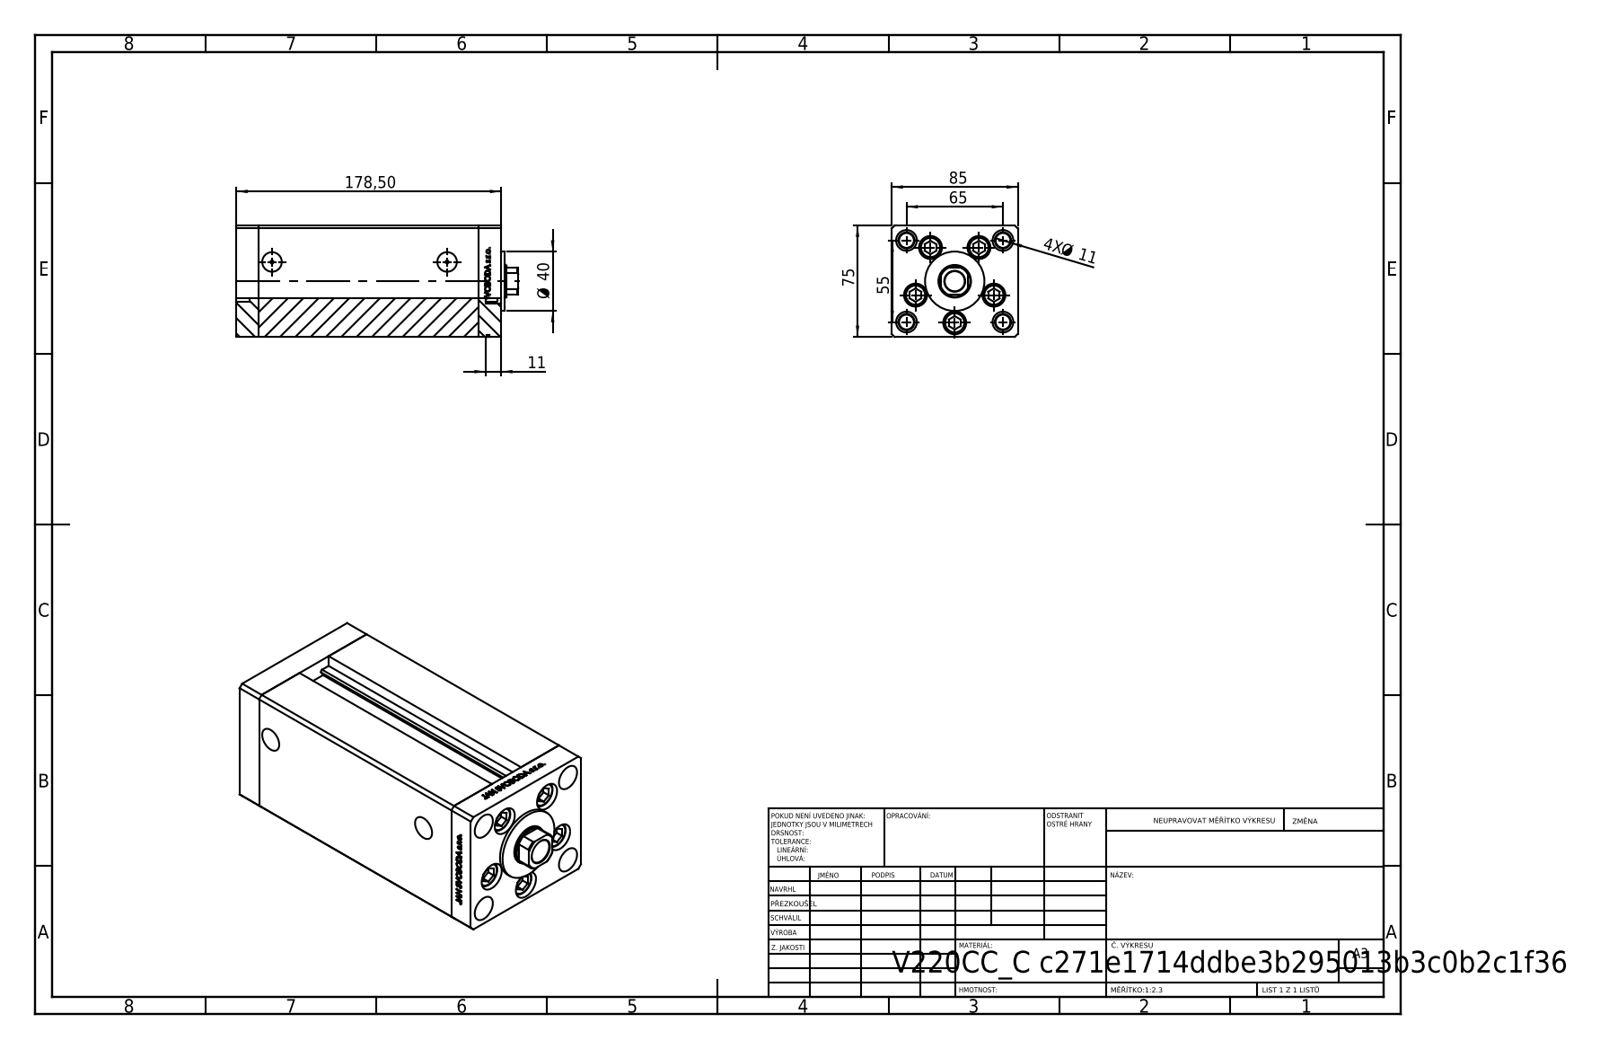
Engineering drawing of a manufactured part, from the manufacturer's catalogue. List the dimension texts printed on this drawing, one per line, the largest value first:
178,50
85
75
65
55
Ø 40
11
4X Ø 11
